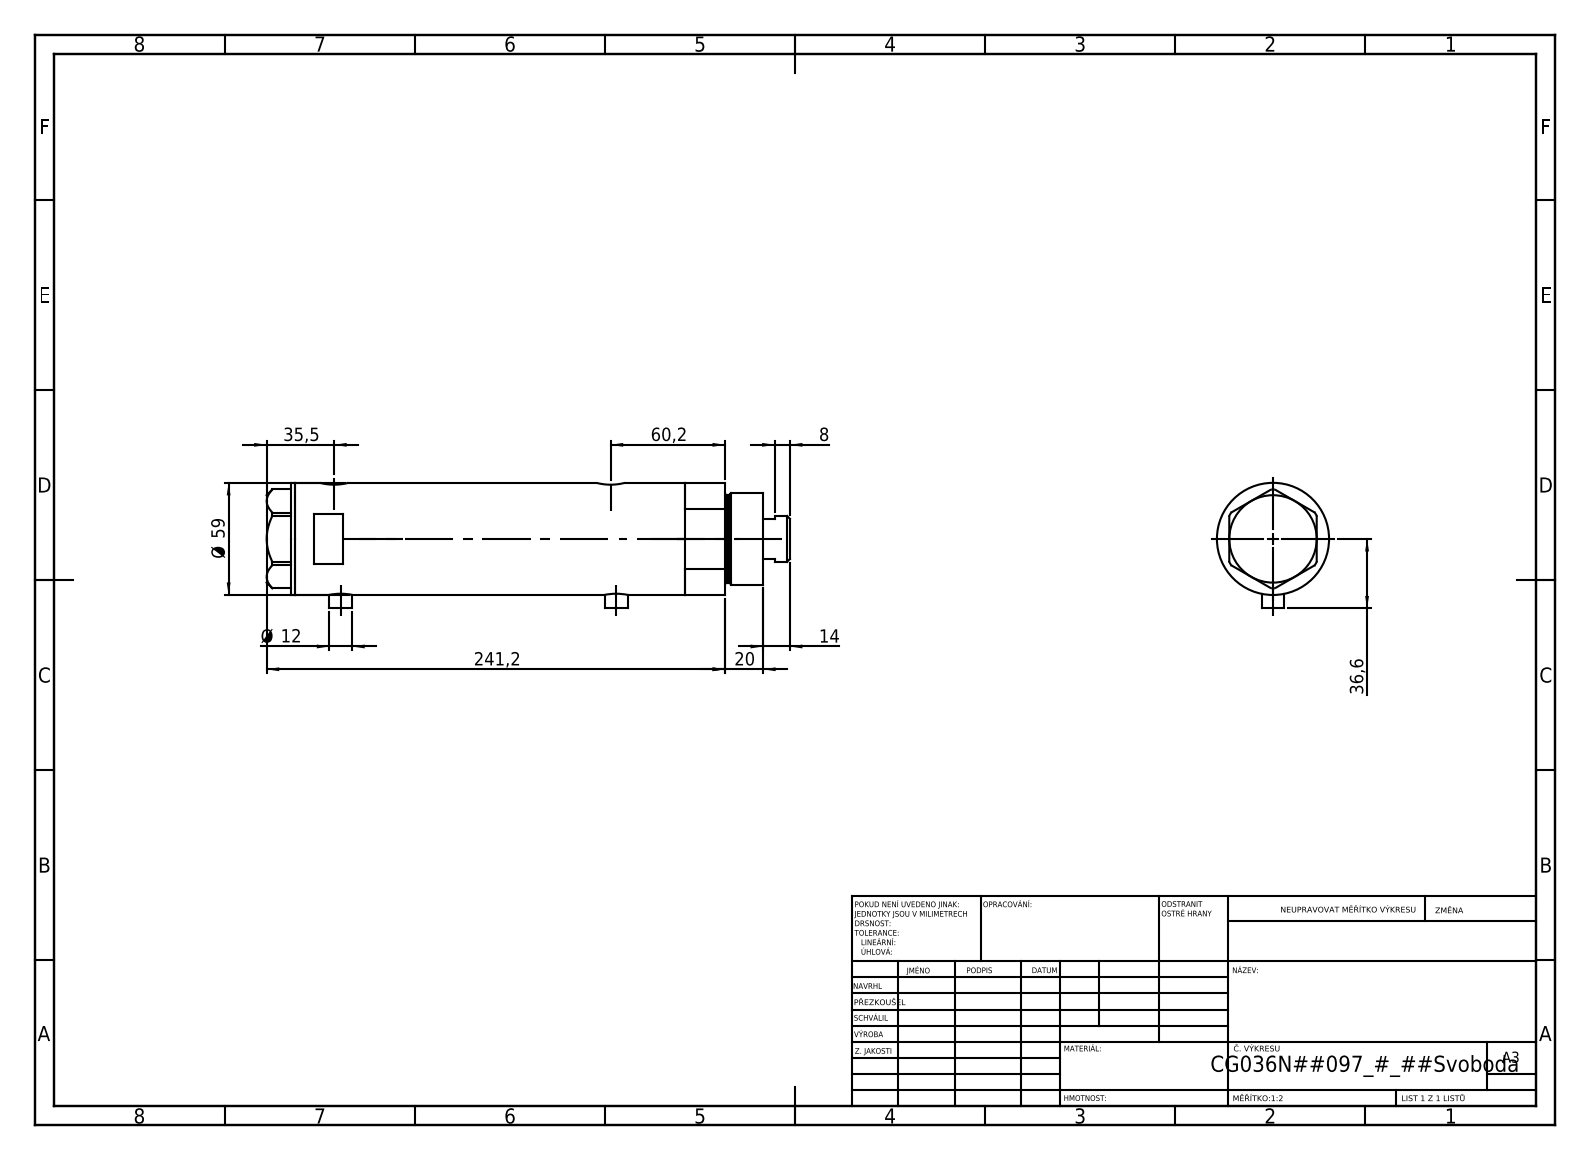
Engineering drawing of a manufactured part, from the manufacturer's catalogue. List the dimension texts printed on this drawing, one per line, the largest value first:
241,2
60,2
Ø 59
36,6
35,5
20
14
Ø 12
8
